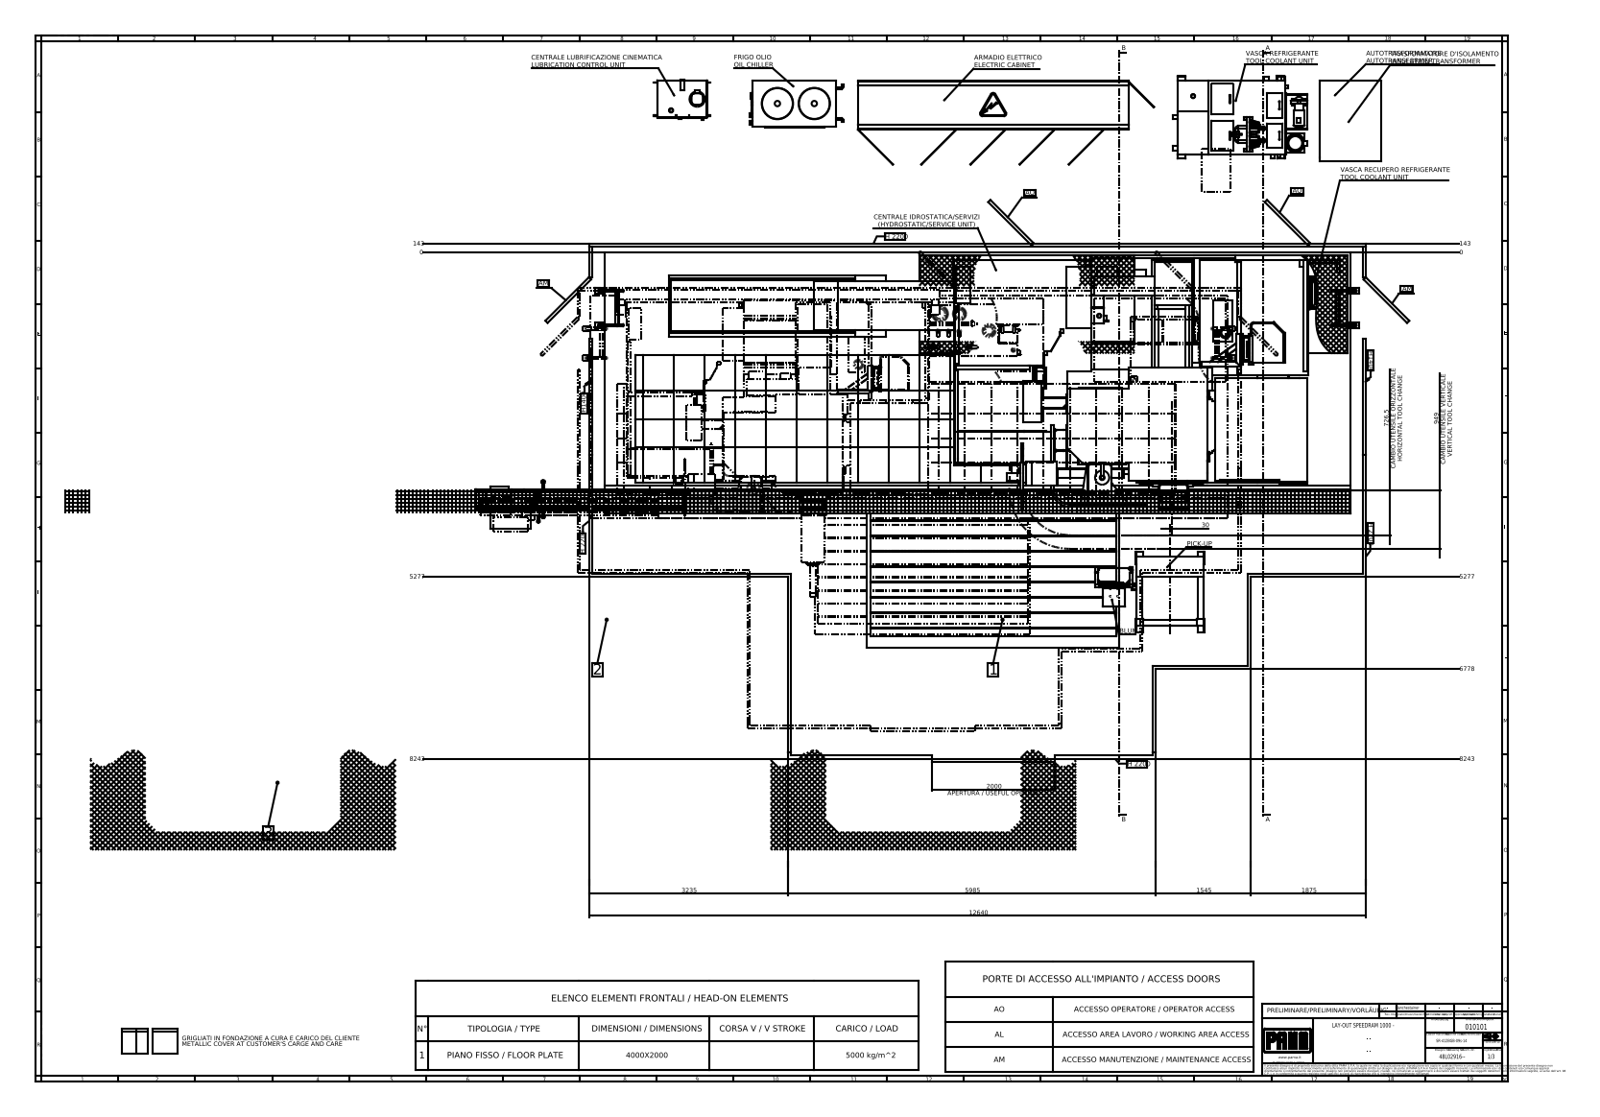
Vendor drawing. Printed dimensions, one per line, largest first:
12640
8243
8243
6778
5985
5277
5277
3235
2000 APERTURA / USEFUL OPENING
1875
1545
949 CAMBIO UTENSILE VERTICALE VERTICAL TOOL CHANGE
726,5 CAMBIO UTENSILE ORIZZONTALE HORIZONTAL TOOL CHANGE
143
143
30
0
0
